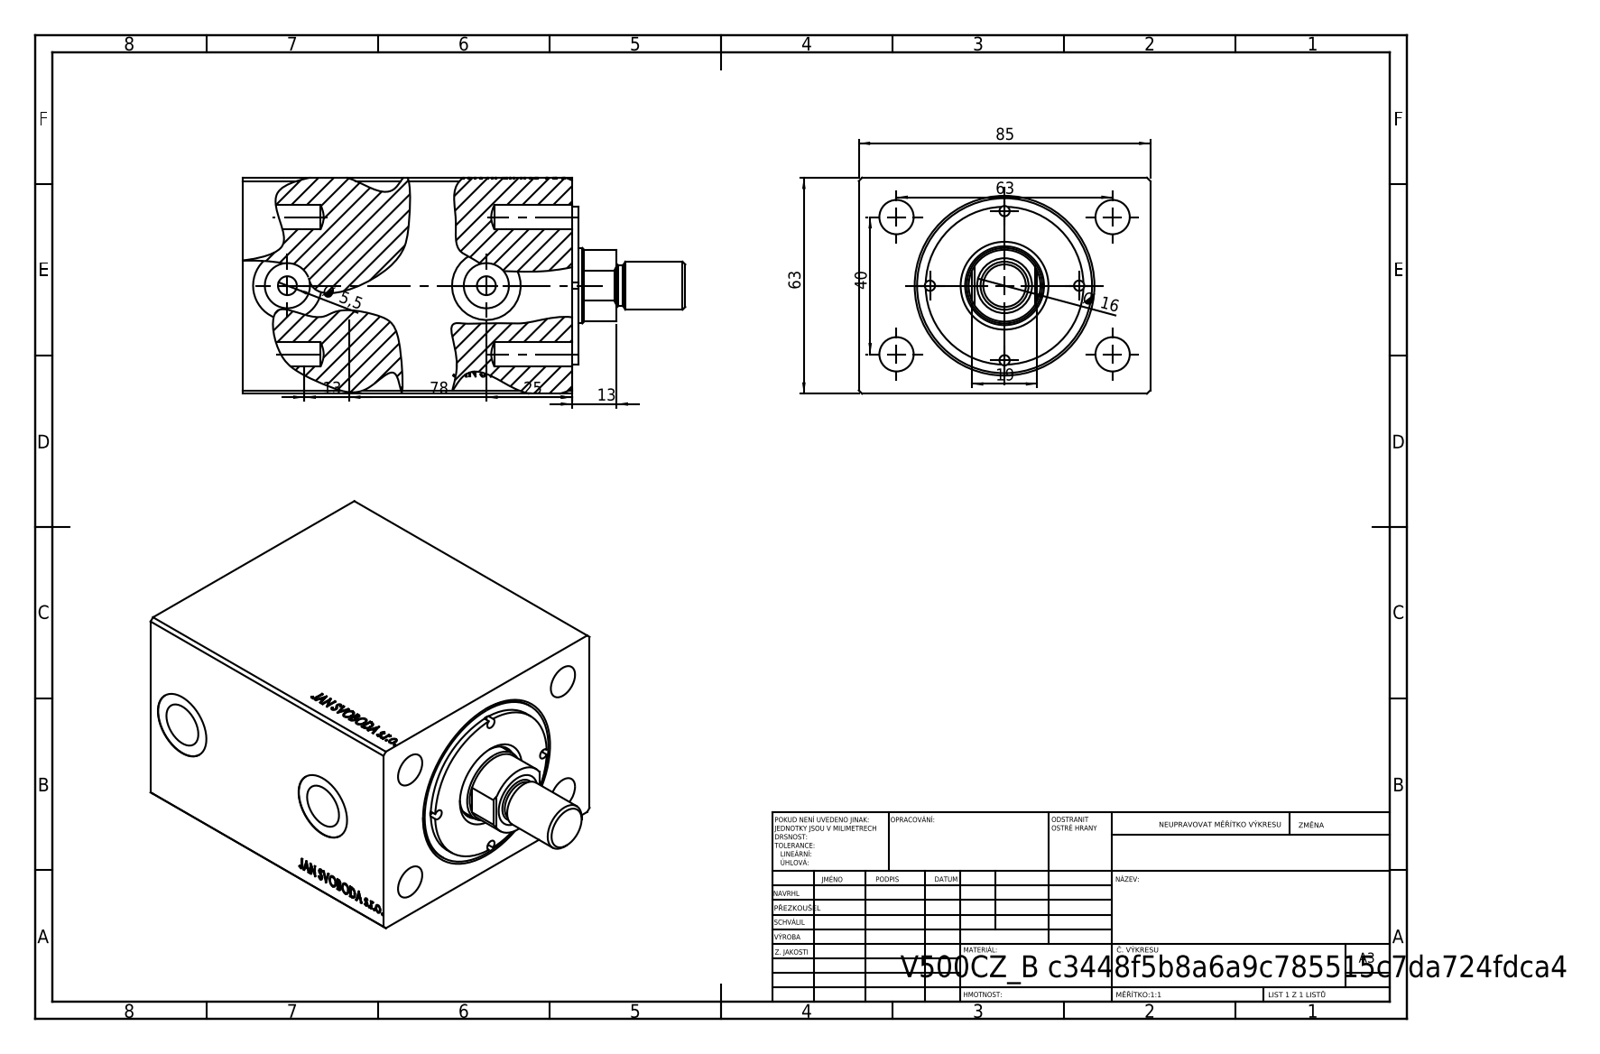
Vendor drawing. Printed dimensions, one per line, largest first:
85
78
63
63
40
25
19
Ø 16
13
13
Ø 5,5
